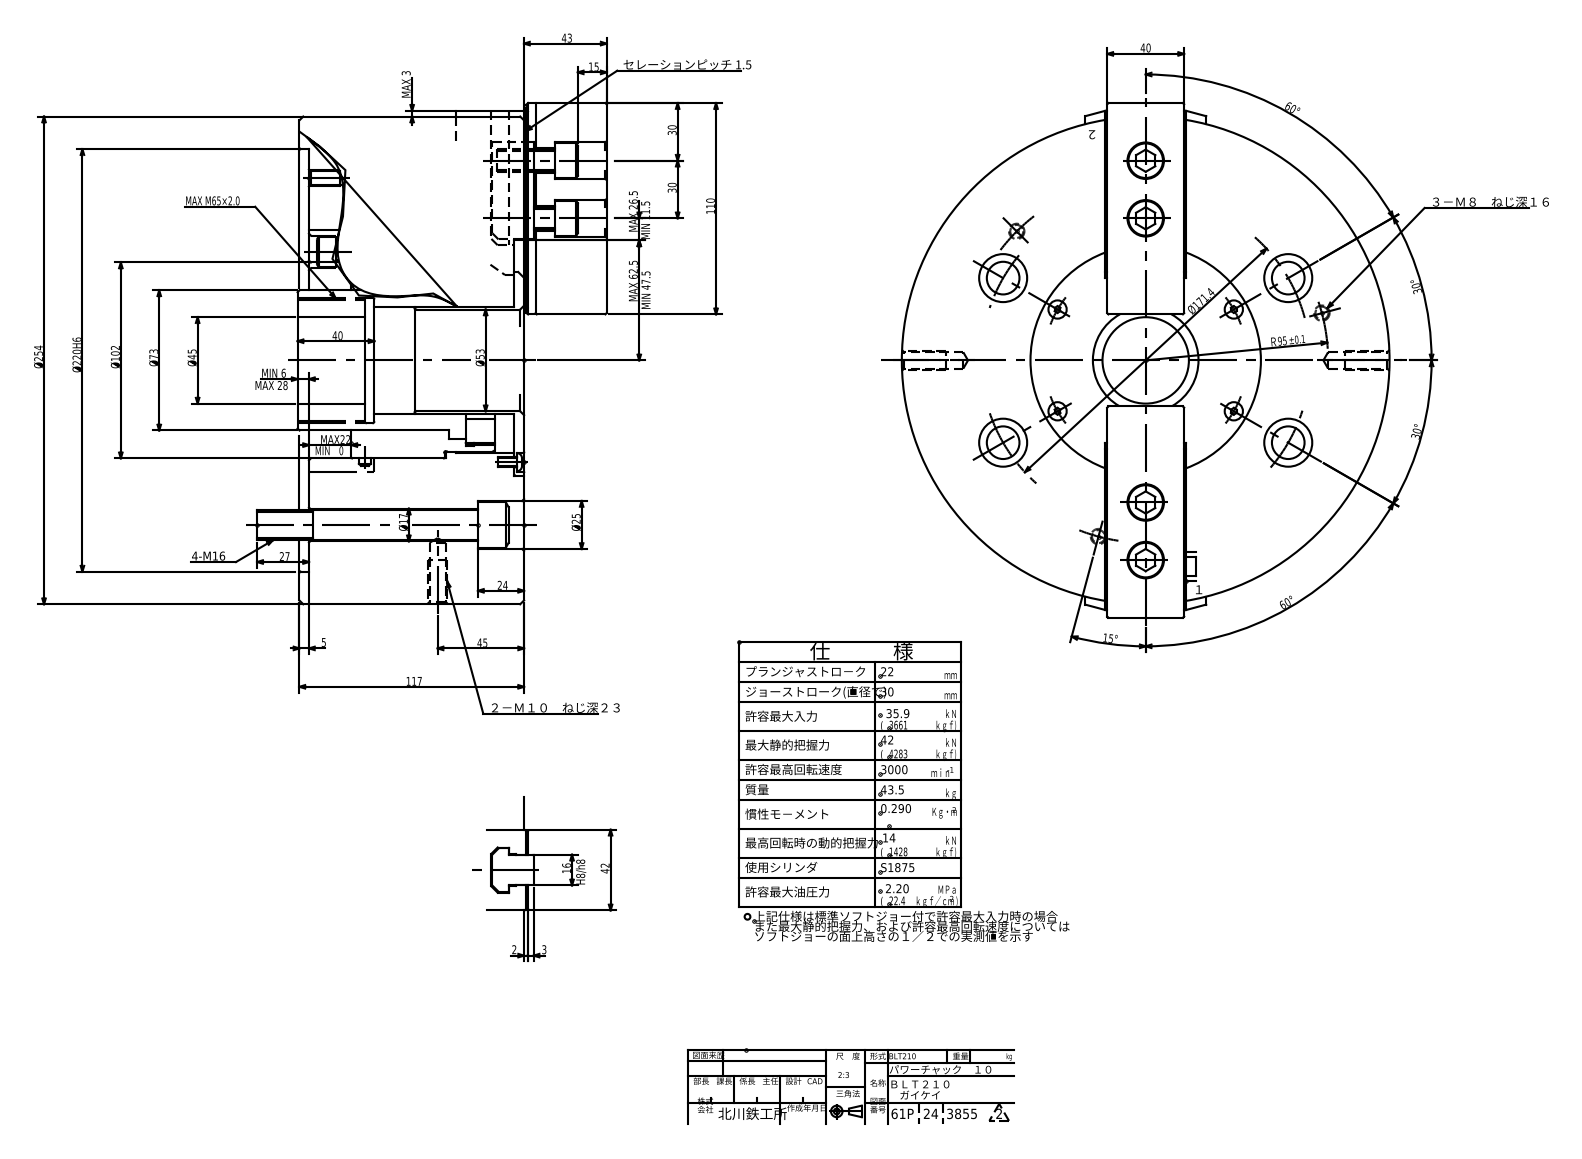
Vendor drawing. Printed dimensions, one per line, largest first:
Ø254
Ø220H6
Ø171.4
117
110
Ø102
Ｒ95 ±0.1
Ø73
MAX 62.5
60°
60°
Ø53
Ø45
45
43
42
40
40
30
30
30°
30°
27
MAX 26.5
Ø25
24
MAX22
Ø17
16
15
15°
MIN 6
5
MAX 3
3
2
